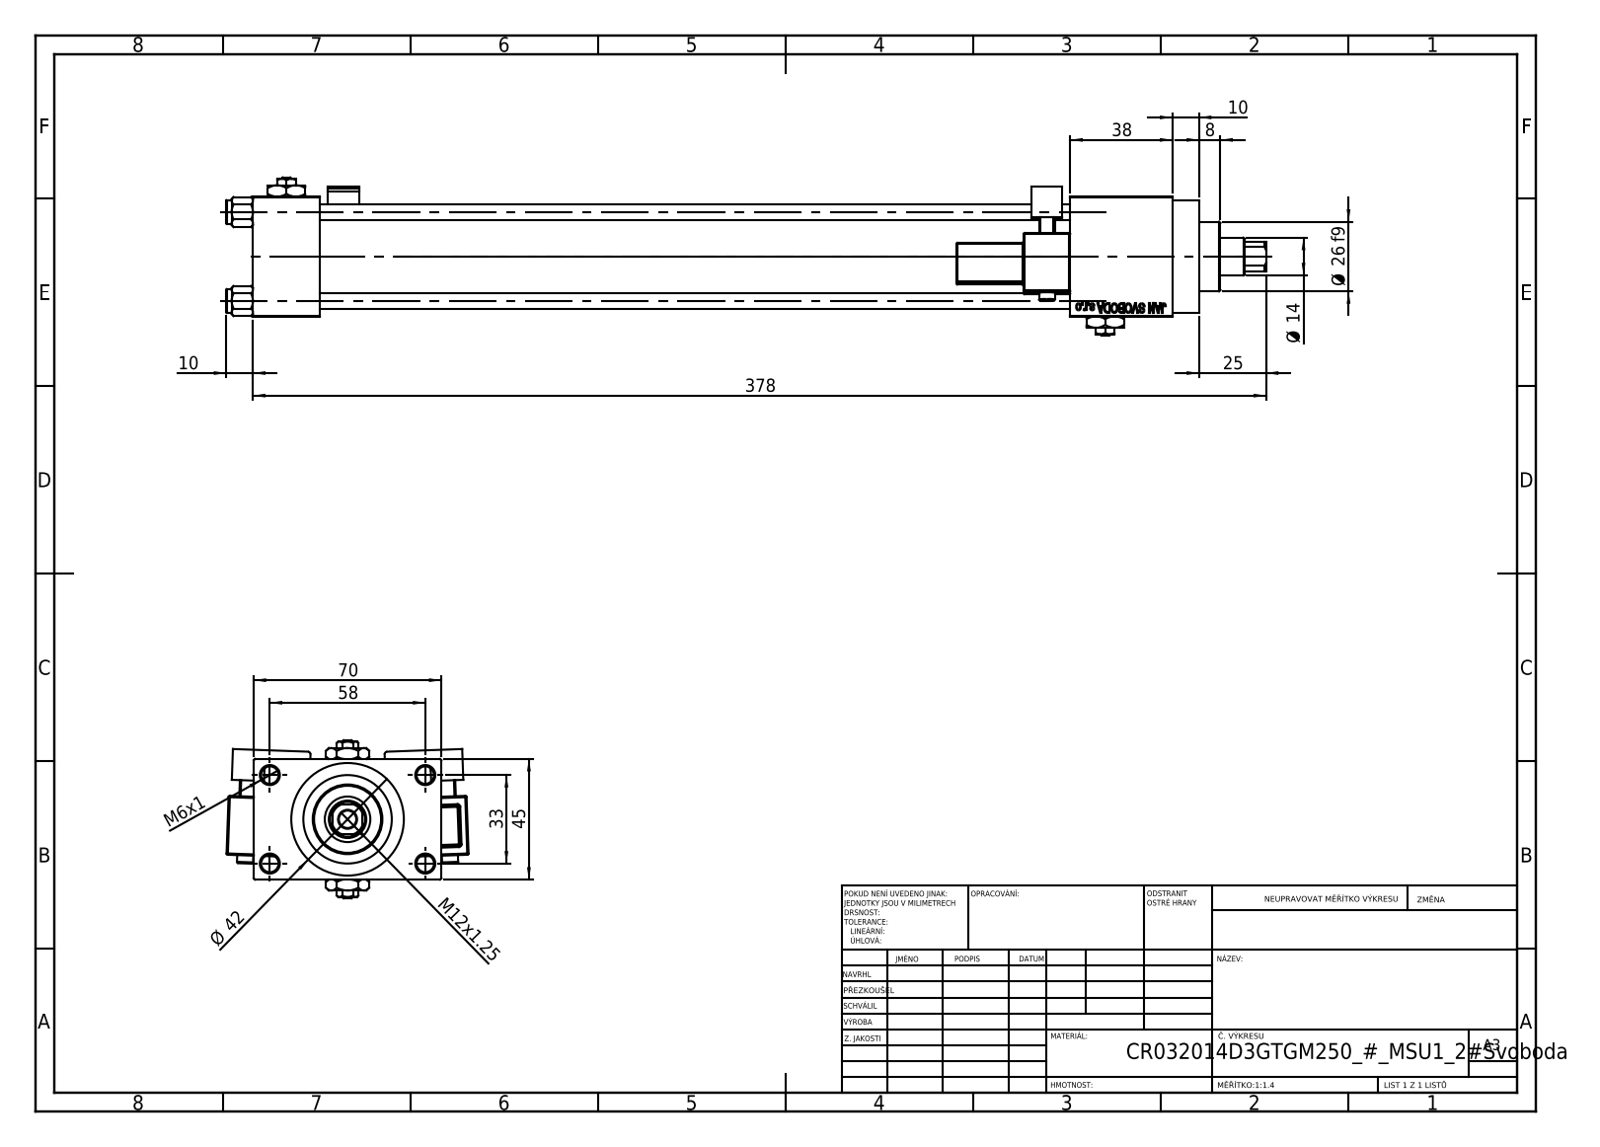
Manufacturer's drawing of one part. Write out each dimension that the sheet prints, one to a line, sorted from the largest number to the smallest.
378
70
58
45
Ø 42
38
33
Ø 26 f9
25
Ø 14
M12x1.25
10
10
8
M6x1
